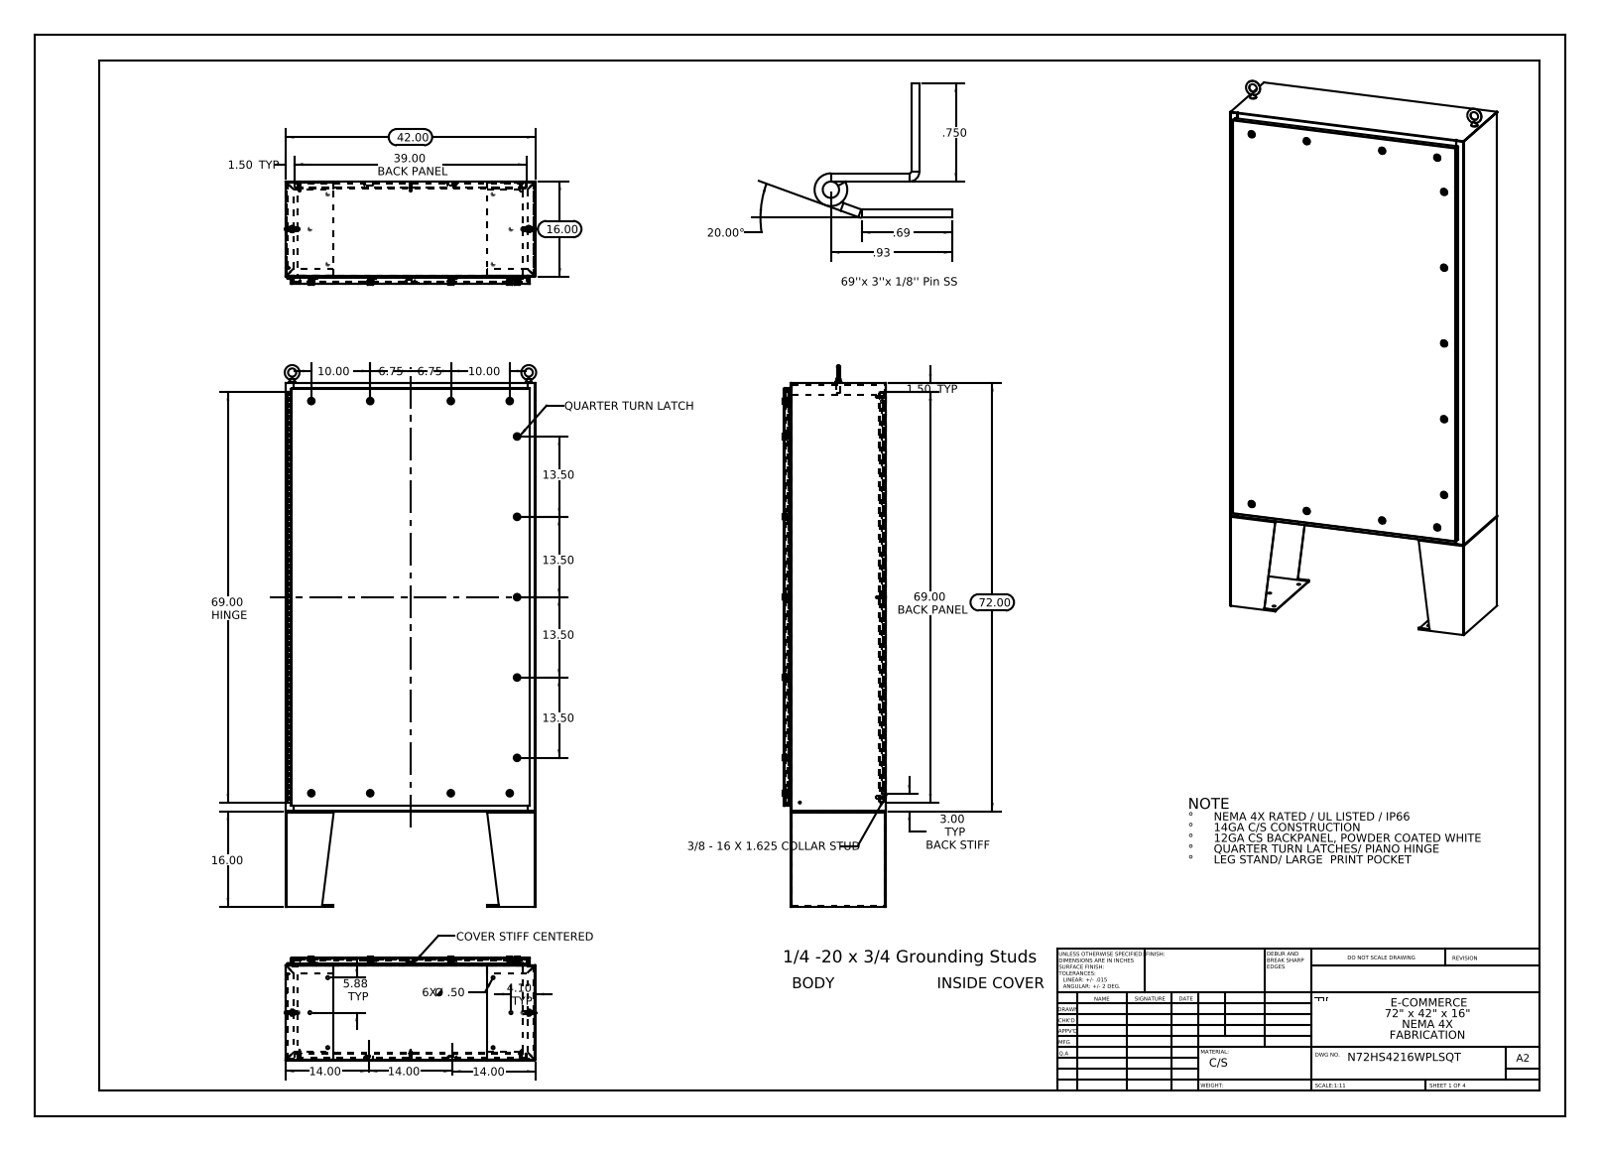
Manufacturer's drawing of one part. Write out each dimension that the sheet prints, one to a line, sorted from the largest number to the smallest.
72.00
69.00 HINGE
69.00 BACK PANEL
42.00
39.00 BACK PANEL
20.00°
16.00
16.00
14.00
14.00
14.00
13.50
13.50
13.50
13.50
10.00
10.00
6.75
6.75
5.88 TYP
4.10 TYP
3.00 TYP BACK STIFF
1.50 TYP
1.50 TYP
.93
.750
.69
6X Ø .50
